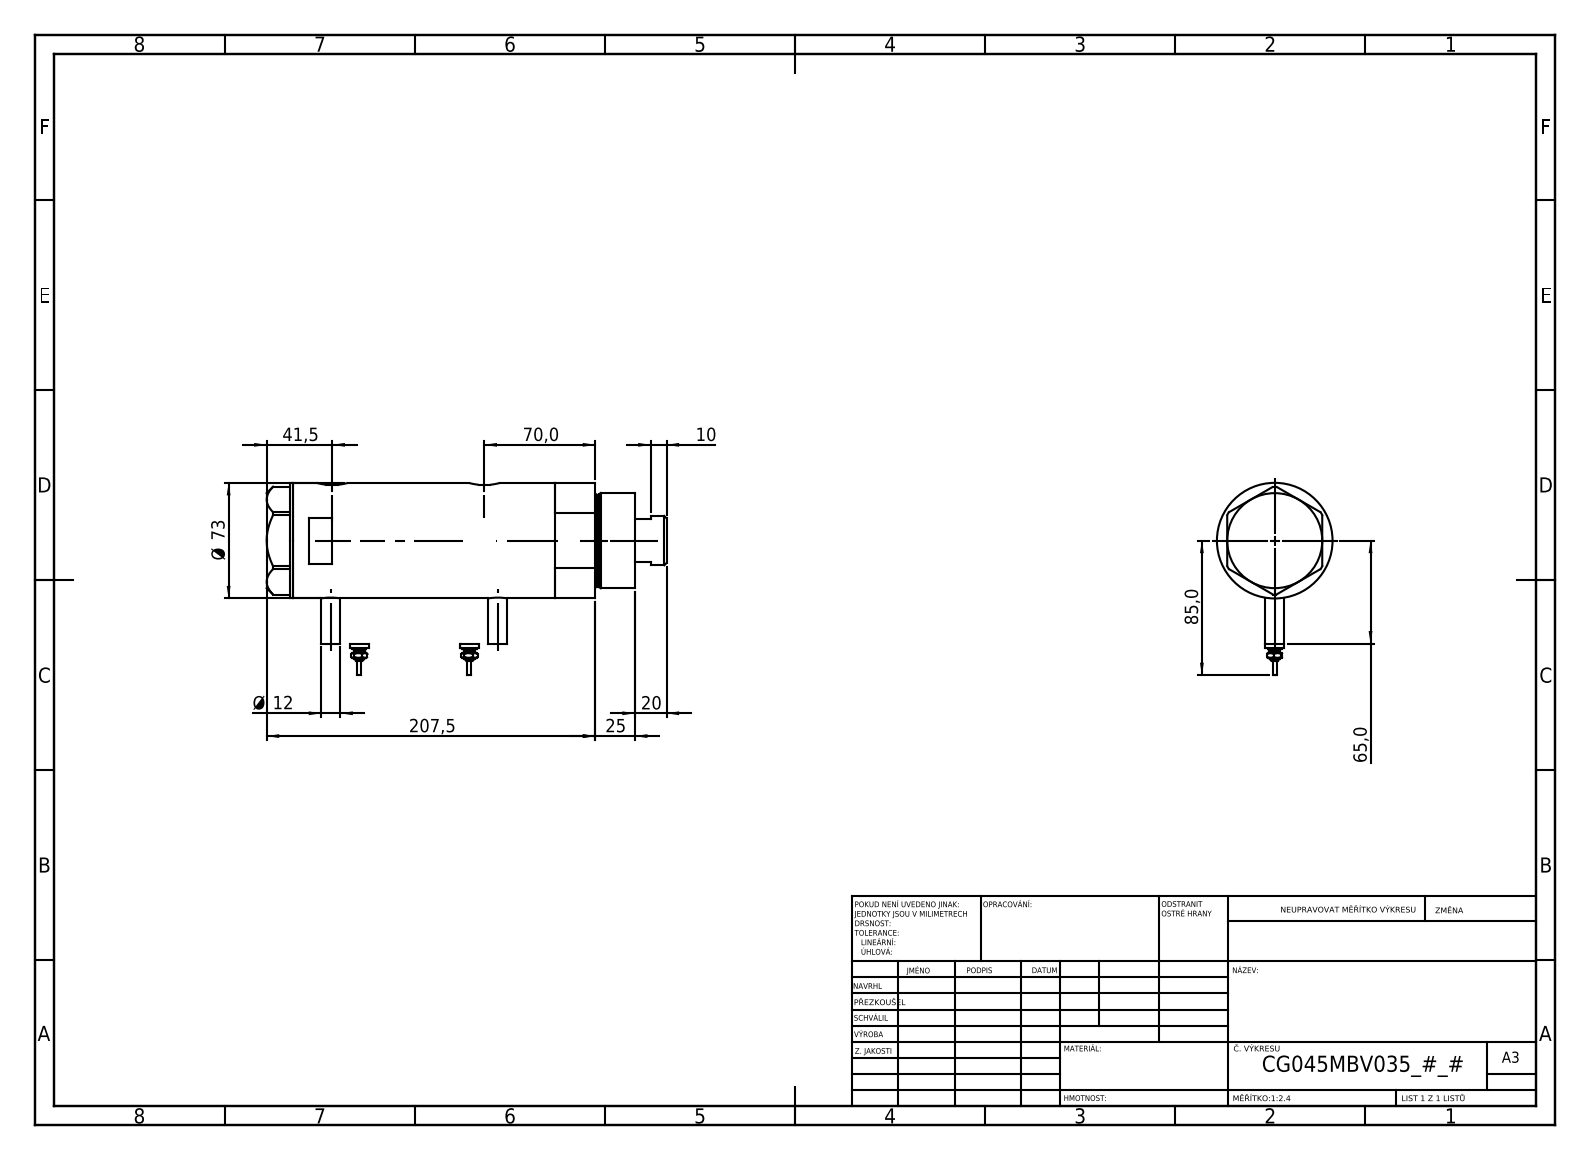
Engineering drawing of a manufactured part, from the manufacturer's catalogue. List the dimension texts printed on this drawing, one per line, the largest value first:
207,5
85,0
Ø 73
70,0
65,0
41,5
25
20
Ø 12
10
